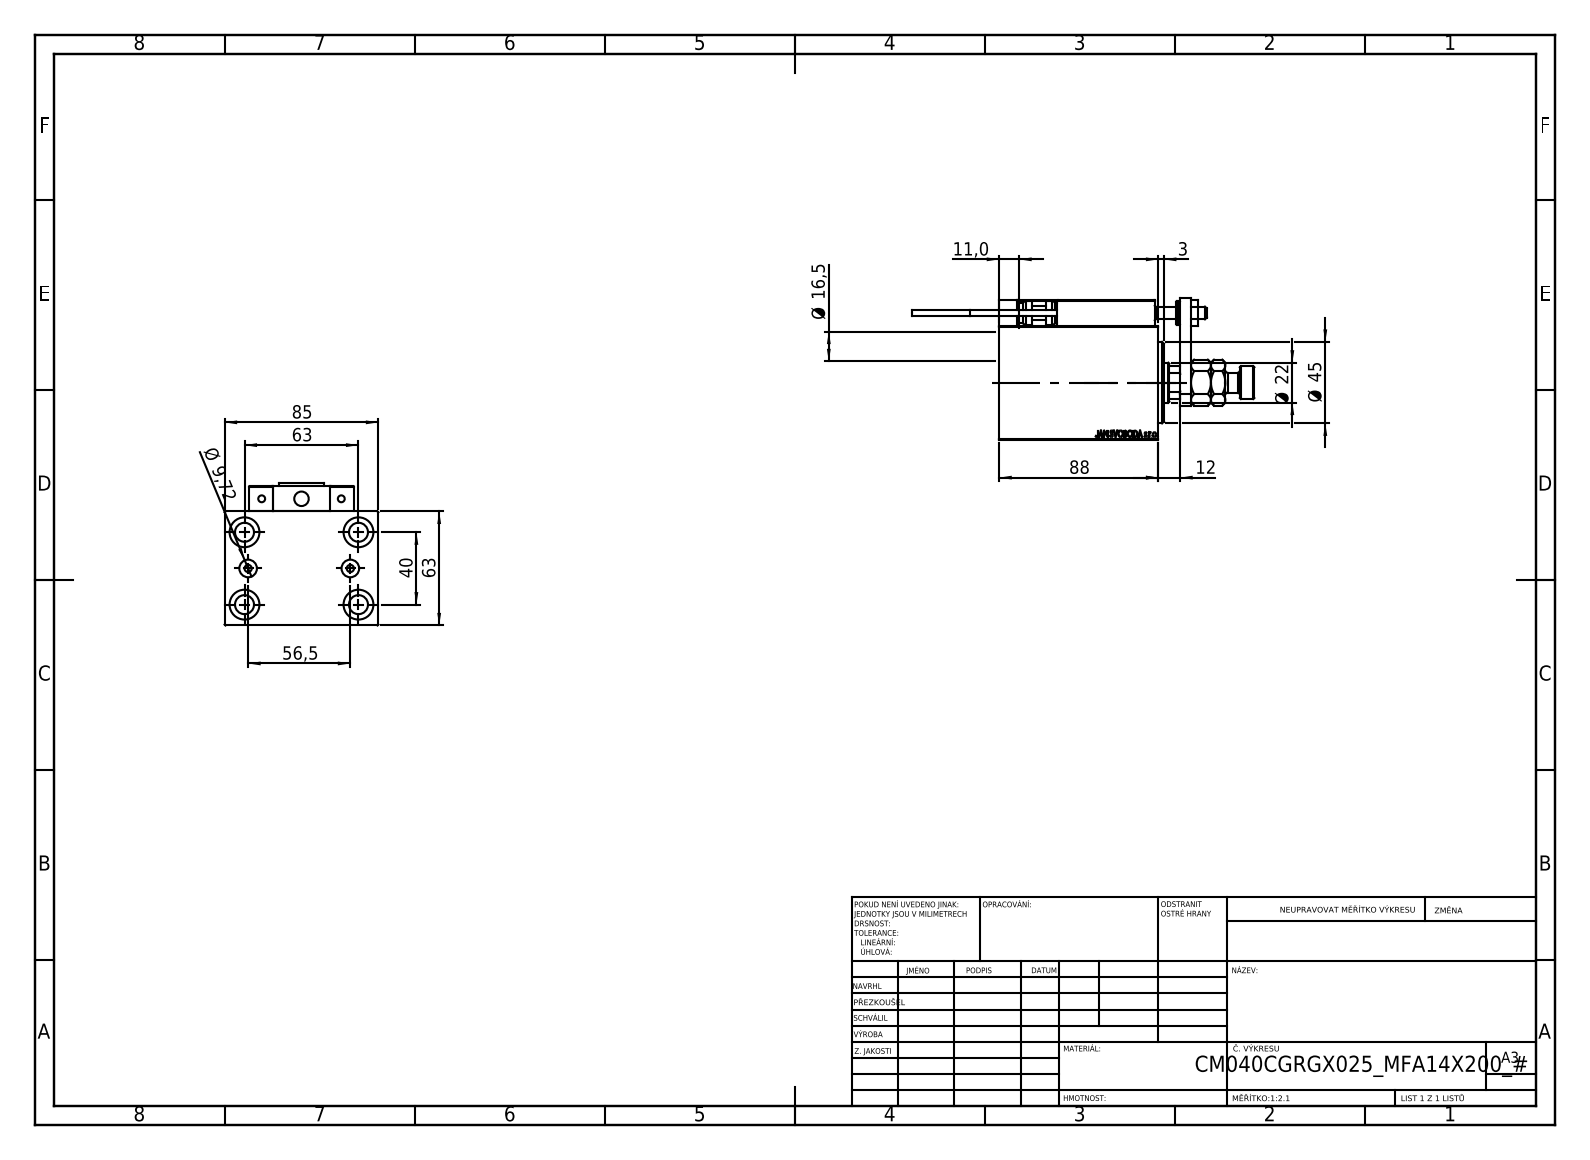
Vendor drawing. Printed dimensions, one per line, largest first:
88
85
63
63
56,5
Ø 45
40
Ø 22
Ø 16,5
12
11,0
Ø 9,72
3
